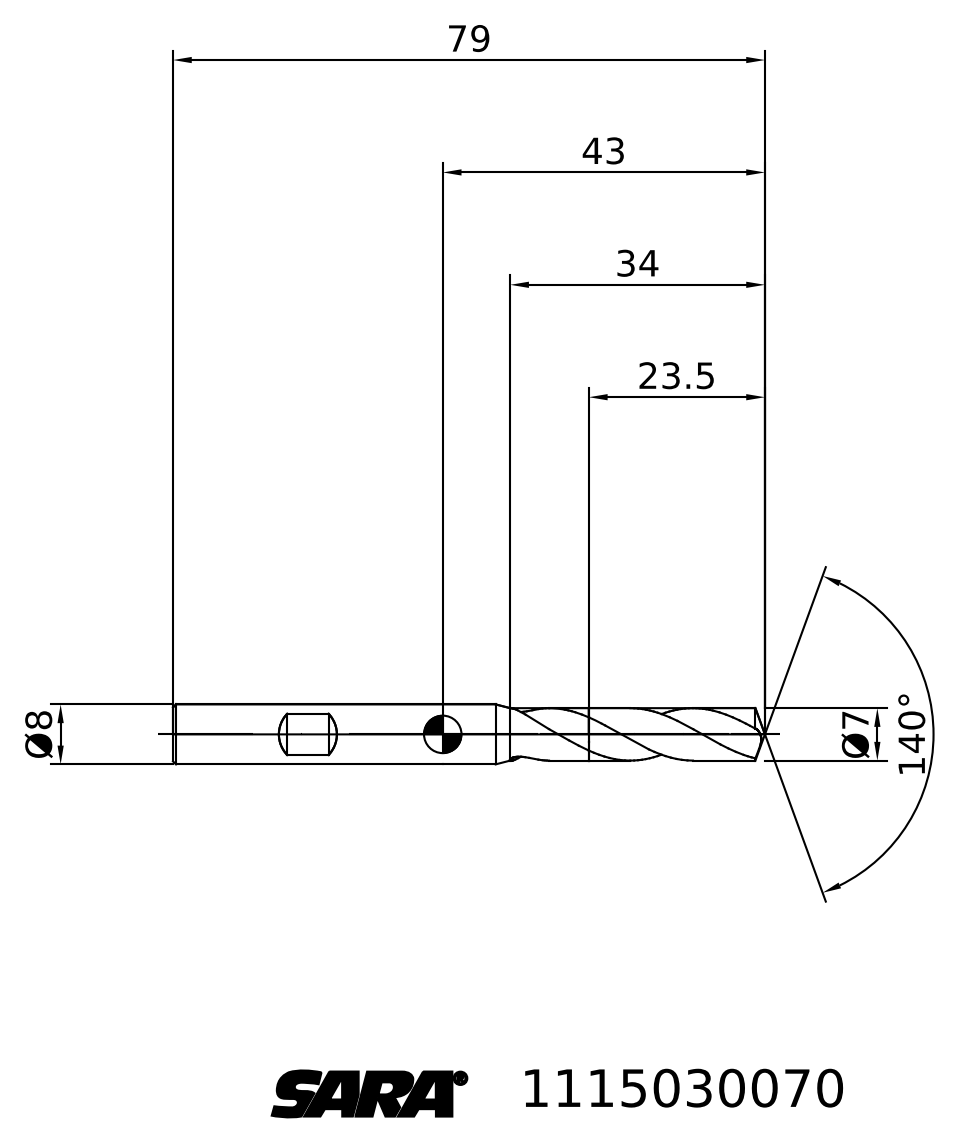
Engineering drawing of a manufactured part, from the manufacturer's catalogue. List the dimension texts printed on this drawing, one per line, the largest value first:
140°
79
43
34
23.5
Ø8
Ø7
